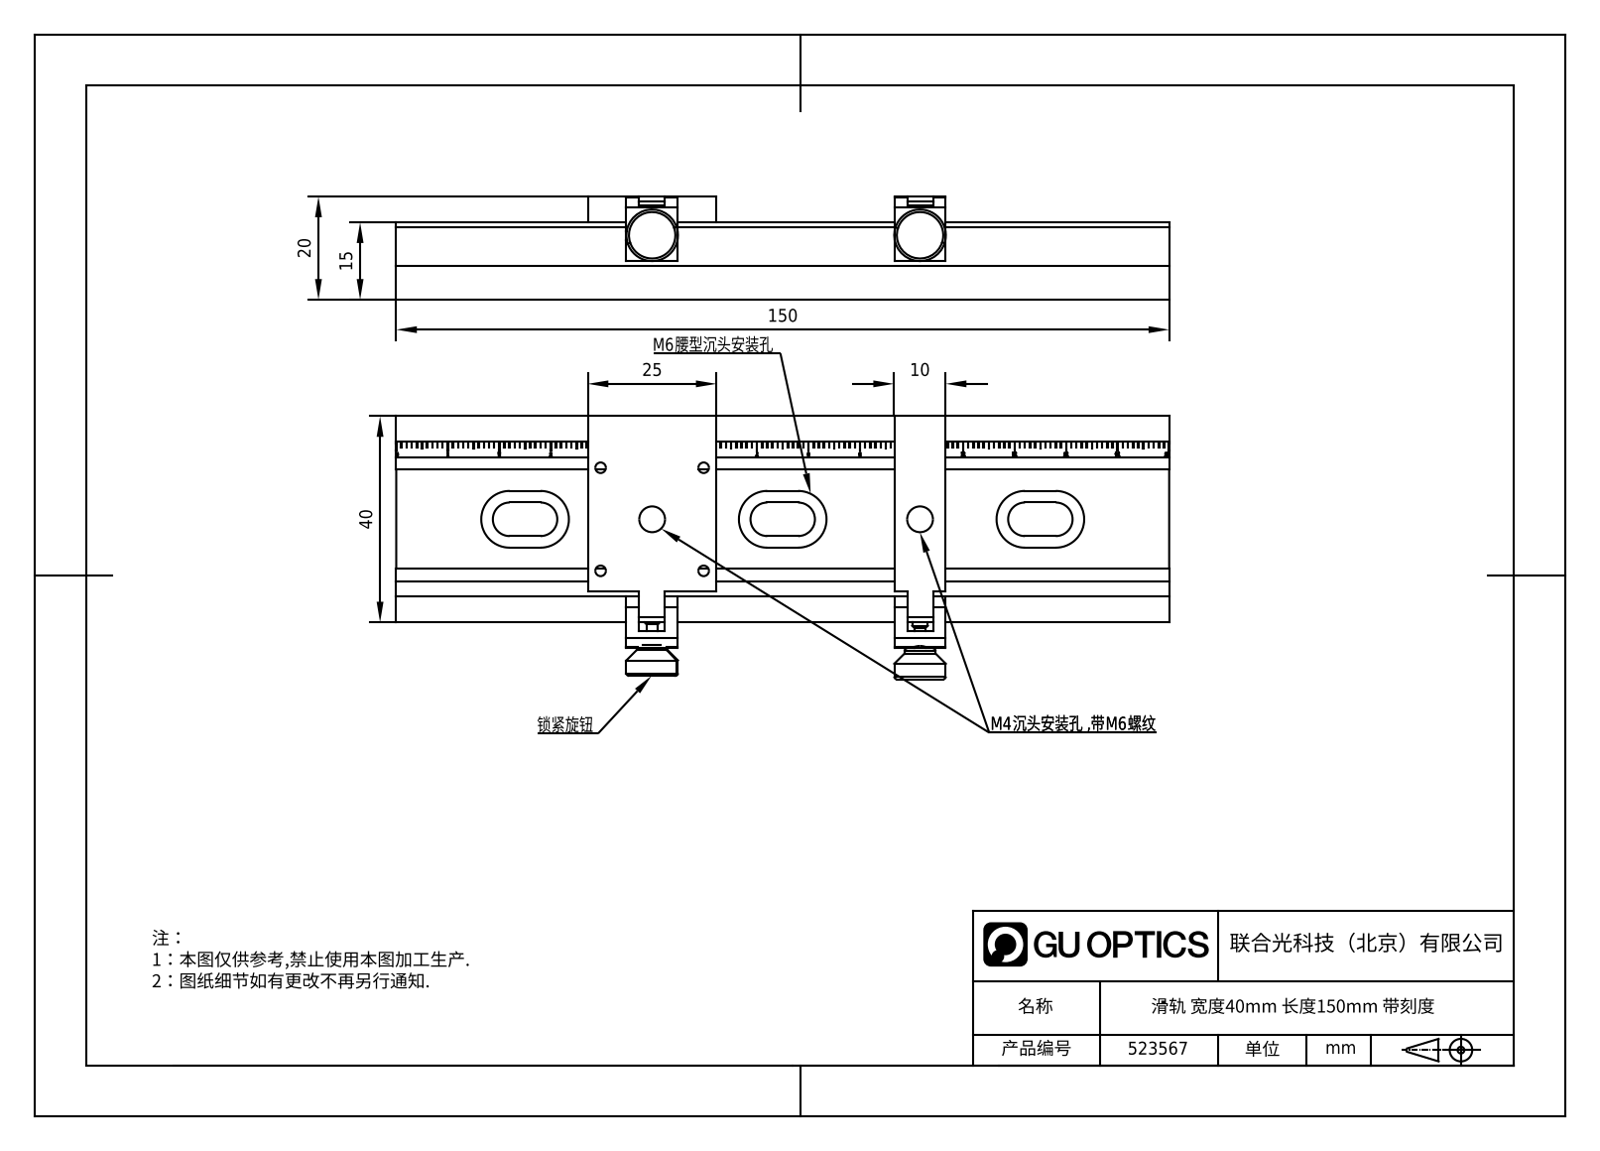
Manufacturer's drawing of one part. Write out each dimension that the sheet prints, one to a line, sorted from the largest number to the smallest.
150
40
25
20
15
10
